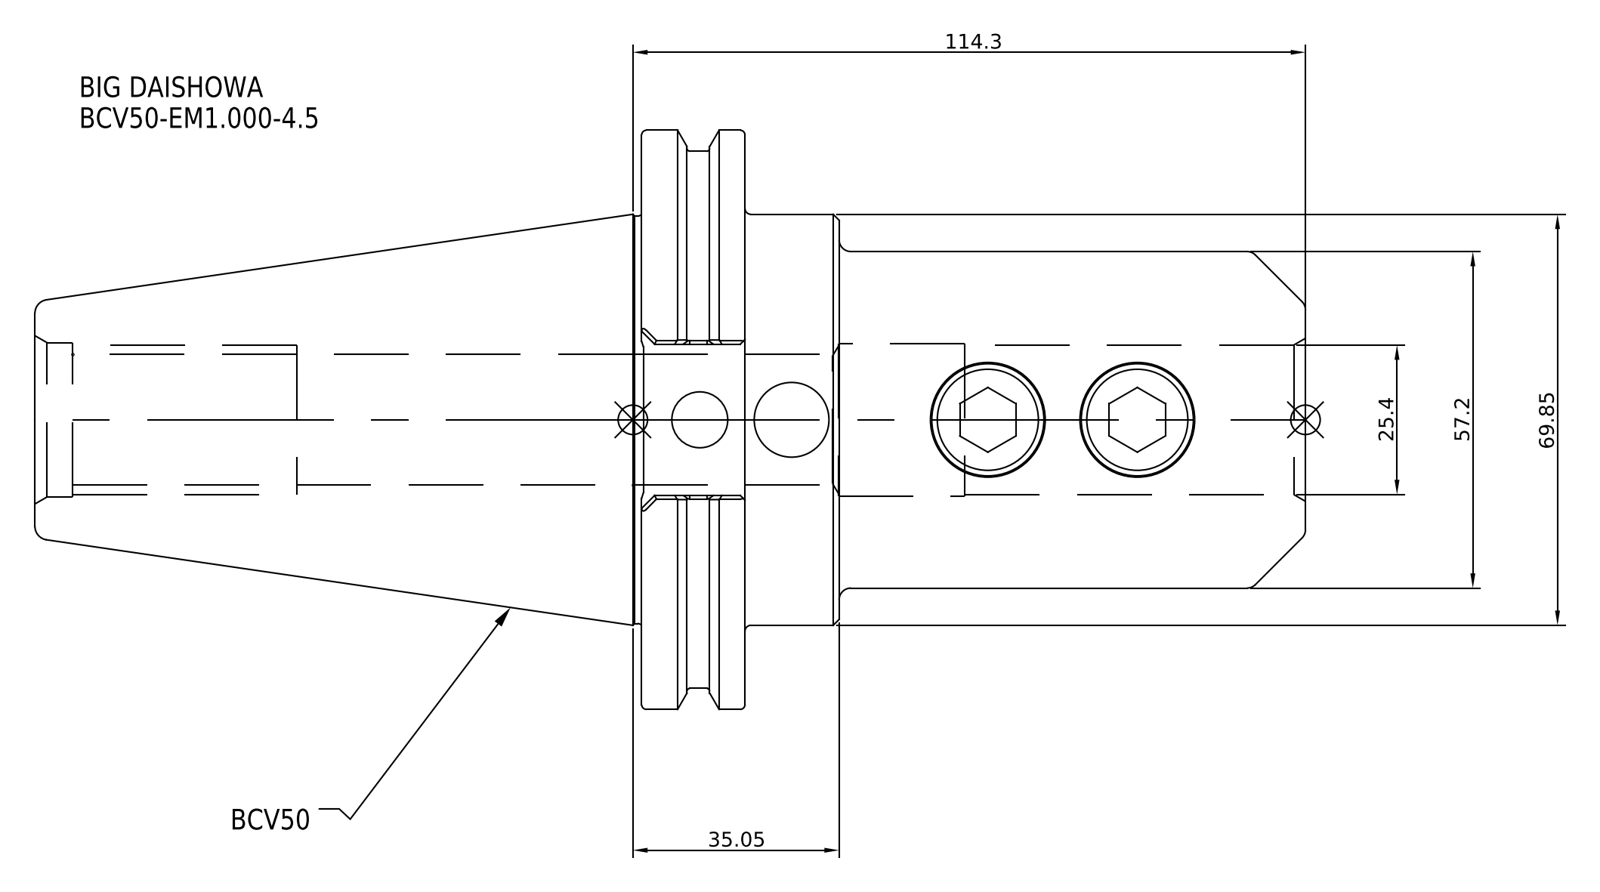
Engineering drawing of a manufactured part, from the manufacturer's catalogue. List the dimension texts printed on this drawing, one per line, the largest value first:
114.3
69.85
57.2
35.05
25.4
